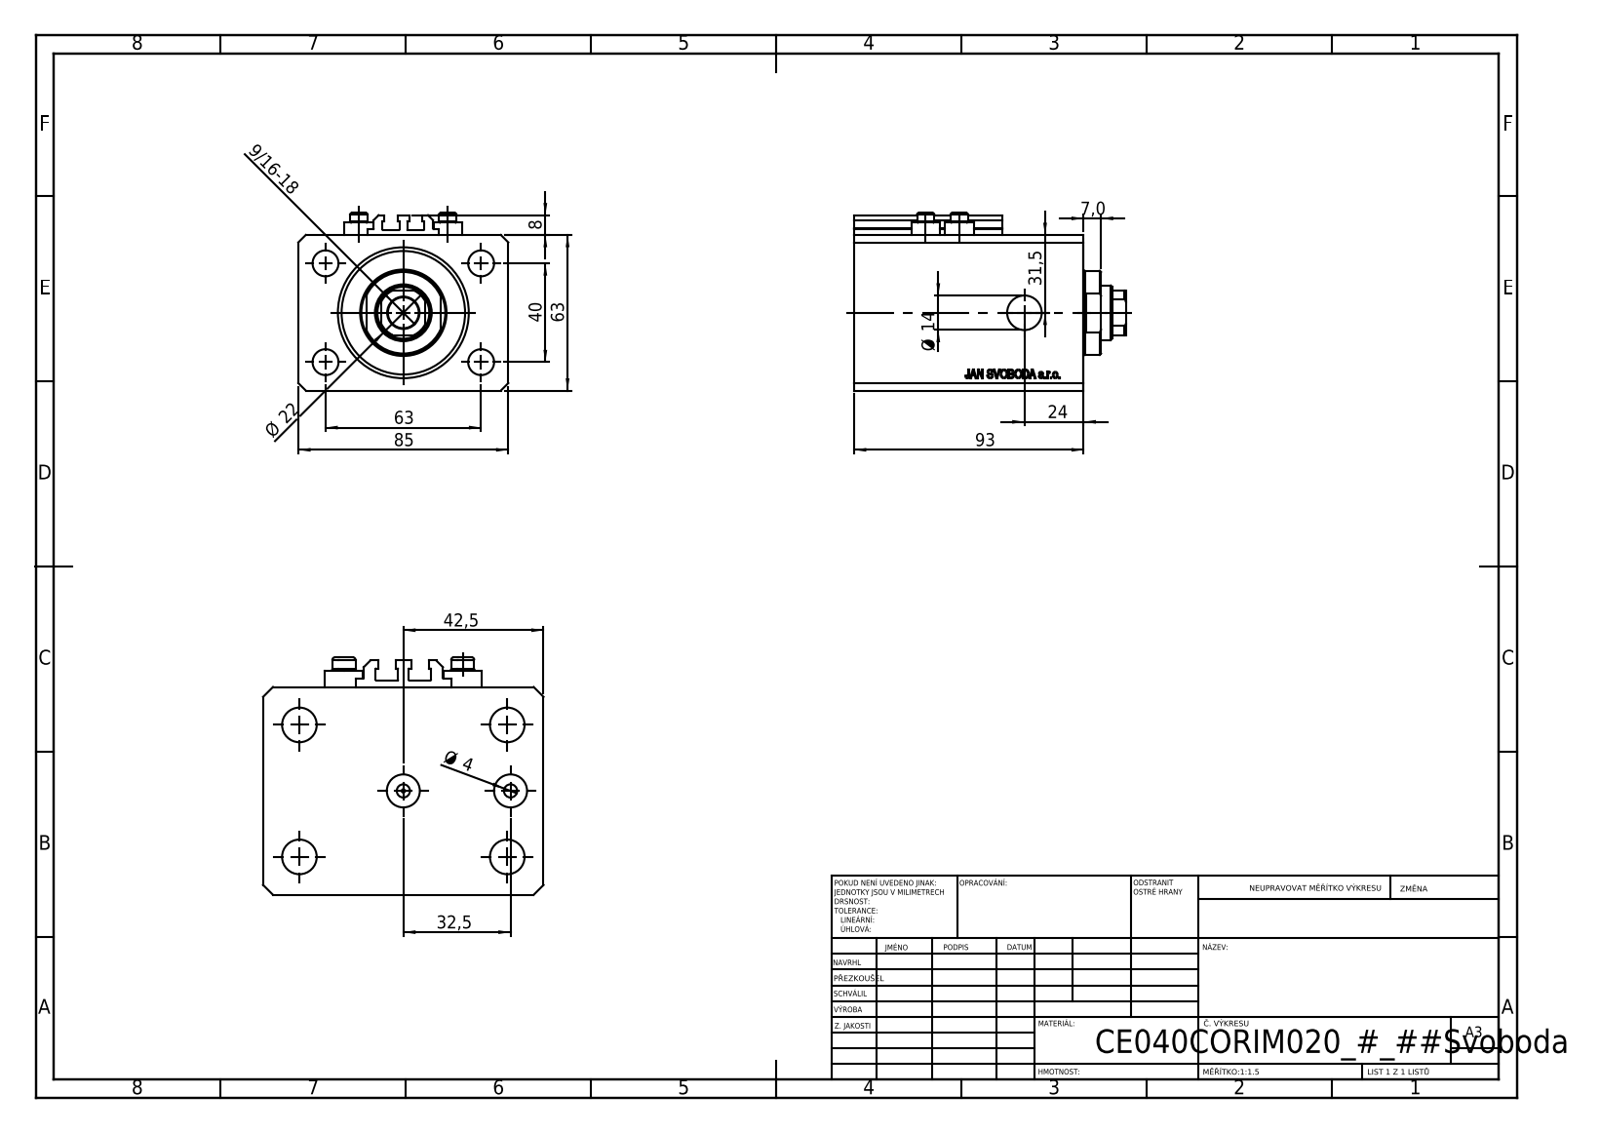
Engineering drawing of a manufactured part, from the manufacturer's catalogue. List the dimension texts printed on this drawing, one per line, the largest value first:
93
85
63
63
42,5
40
32,5
31,5
24
Ø 22
Ø 14
8
7,0
Ø 4
9/16-18
